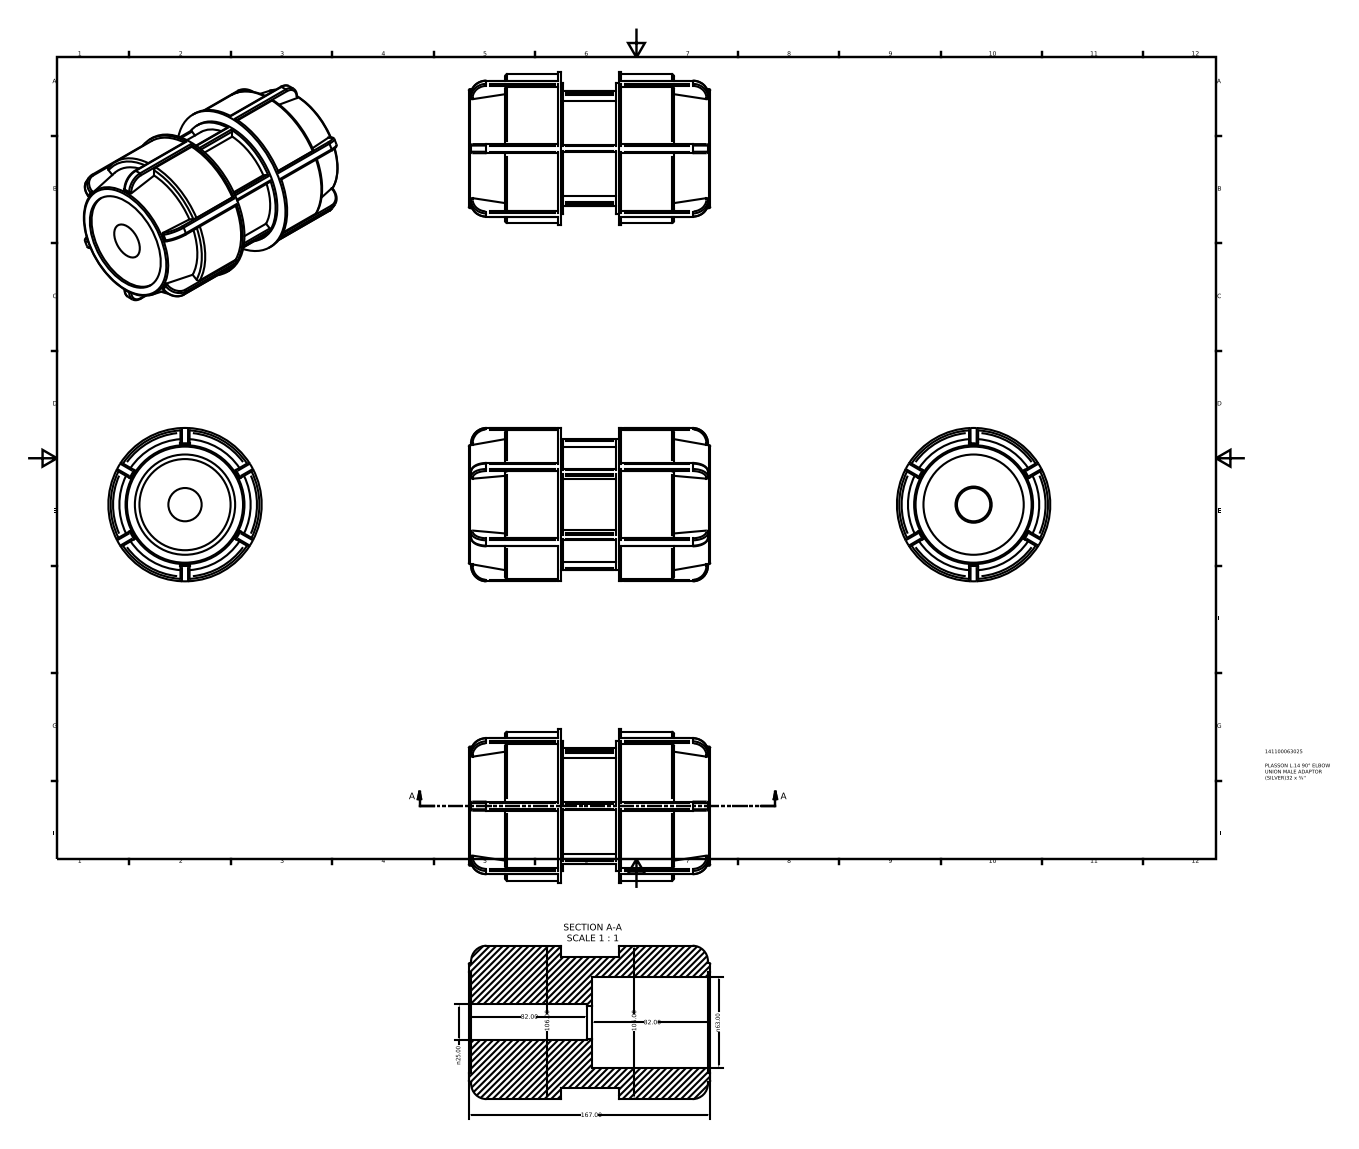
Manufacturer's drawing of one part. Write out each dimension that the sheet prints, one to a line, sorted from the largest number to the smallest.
167.00
106.00
106.00
82.00
82.00
n63.00
n25.00
